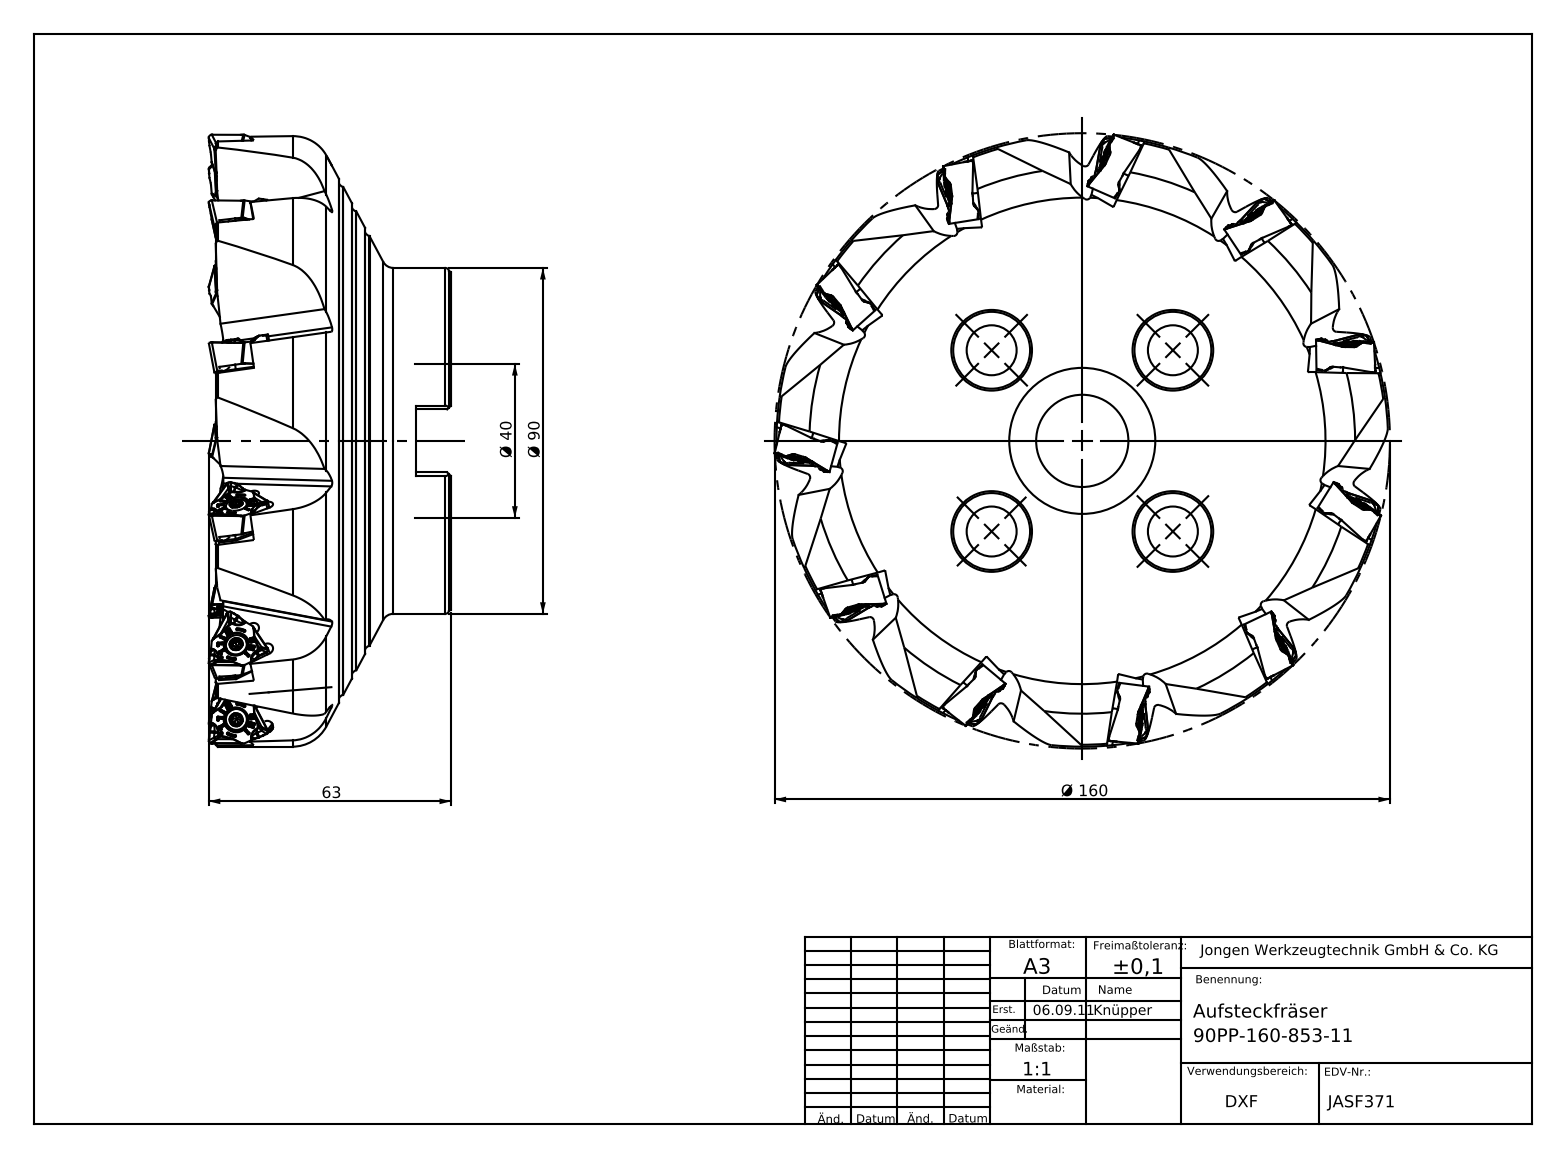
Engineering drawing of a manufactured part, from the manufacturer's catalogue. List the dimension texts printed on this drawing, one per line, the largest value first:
Ø 160
Ø 90
63
Ø 40
